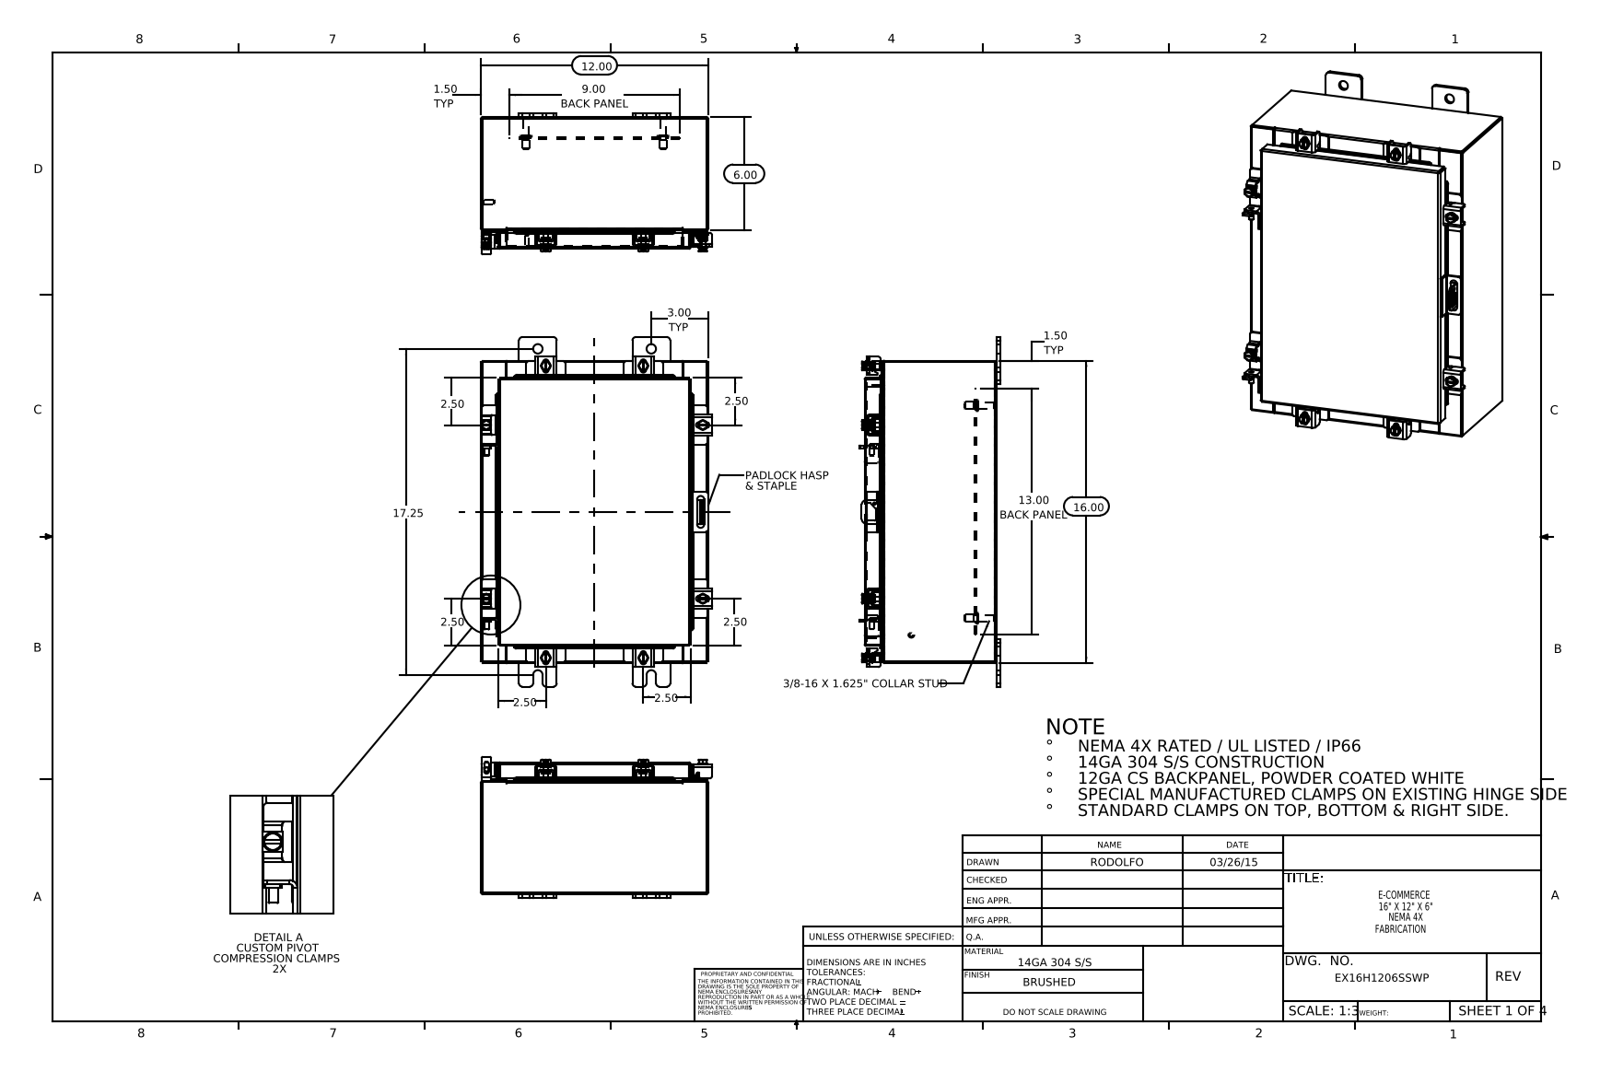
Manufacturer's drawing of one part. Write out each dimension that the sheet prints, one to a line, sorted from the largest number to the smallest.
17.25
16.00
13.00 BACK PANEL
12.00
9.00 BACK PANEL
6.00
3.00 TYP
2.50
2.50
2.50
2.50
2.50
2.50
1.50 TYP
1.50 TYP
